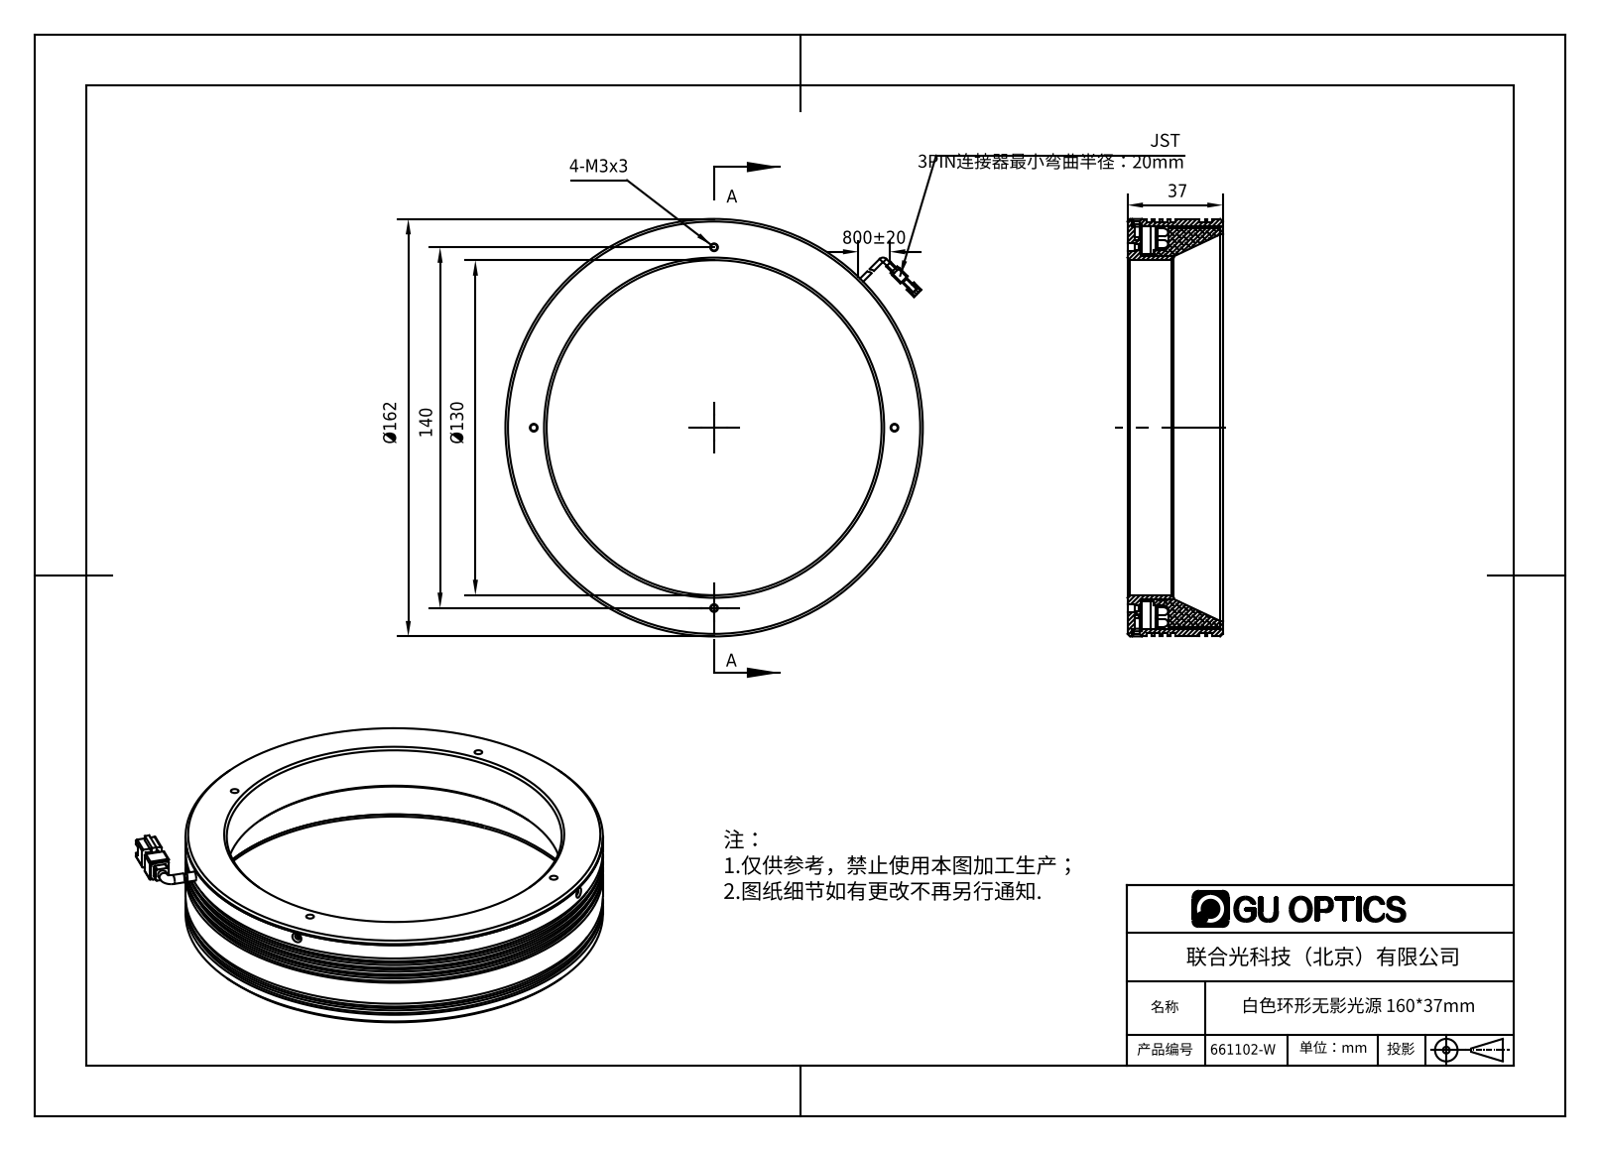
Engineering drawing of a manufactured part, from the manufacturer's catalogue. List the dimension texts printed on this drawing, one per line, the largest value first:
800±20
Ø162
140
Ø130
37
